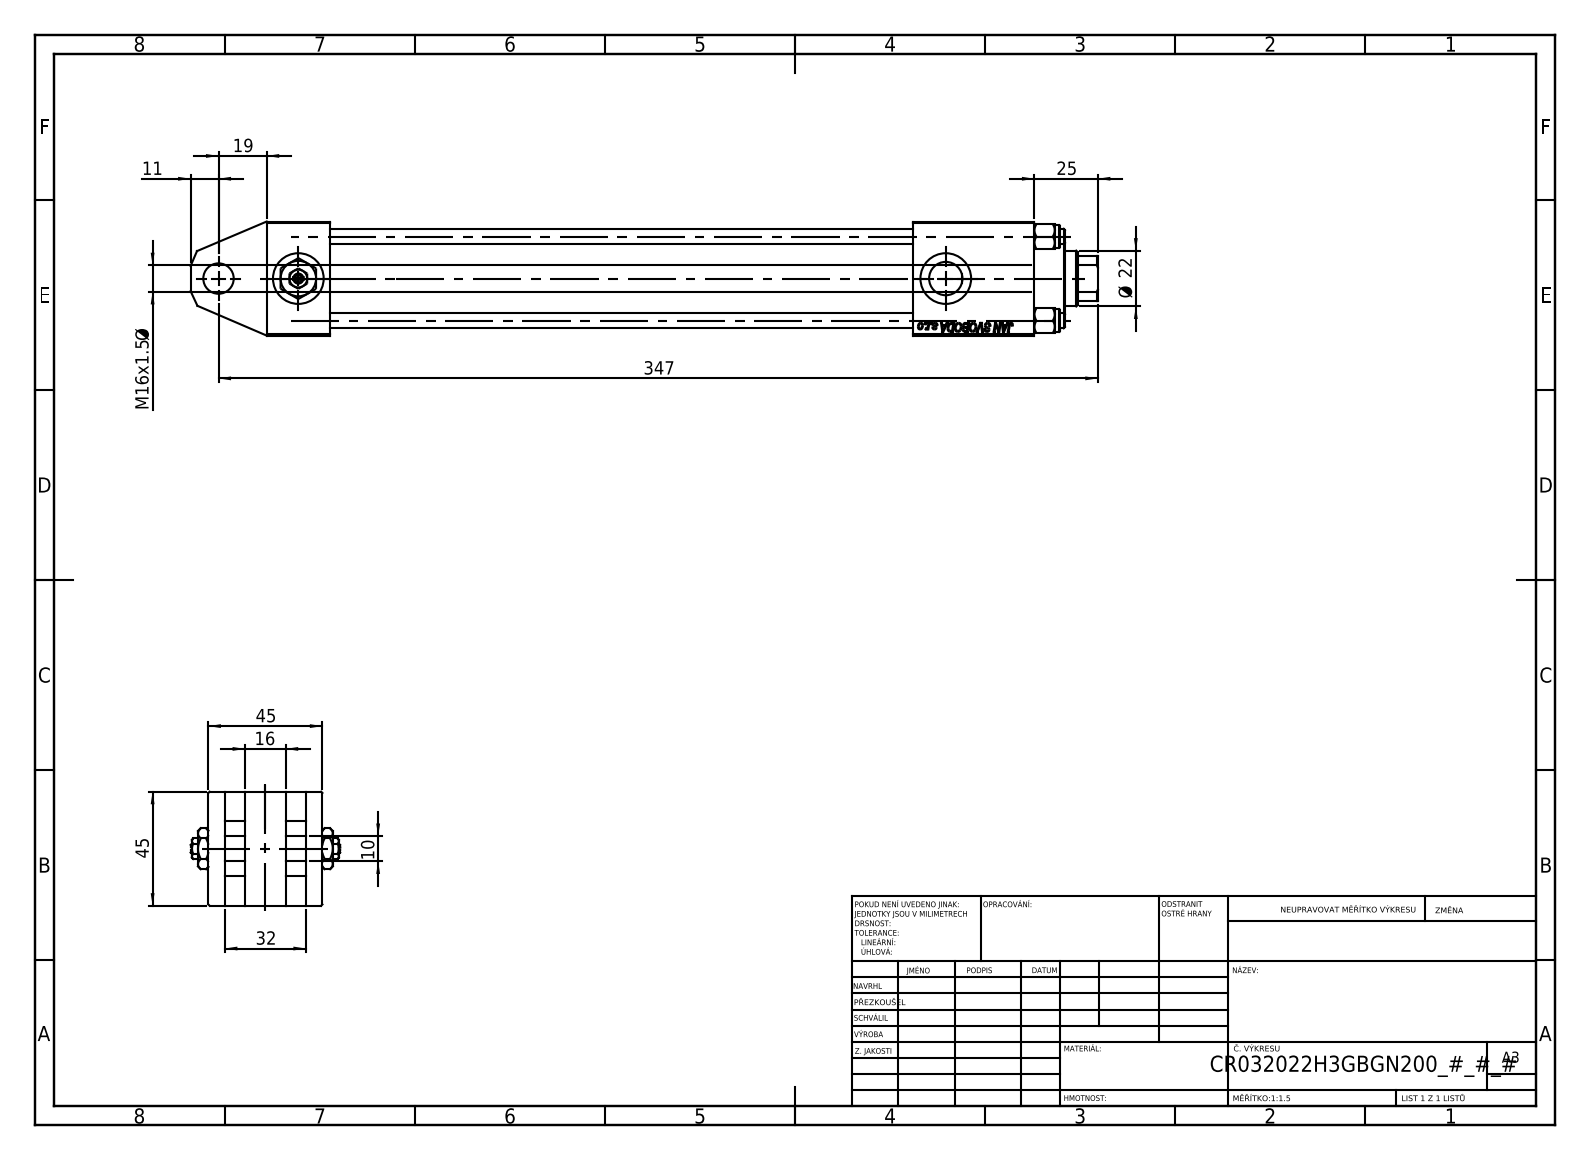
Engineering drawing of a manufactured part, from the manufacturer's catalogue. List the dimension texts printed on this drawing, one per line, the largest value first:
347
45
45
32
25
Ø 22
19
M16x1.5 Ø
16
11
10
